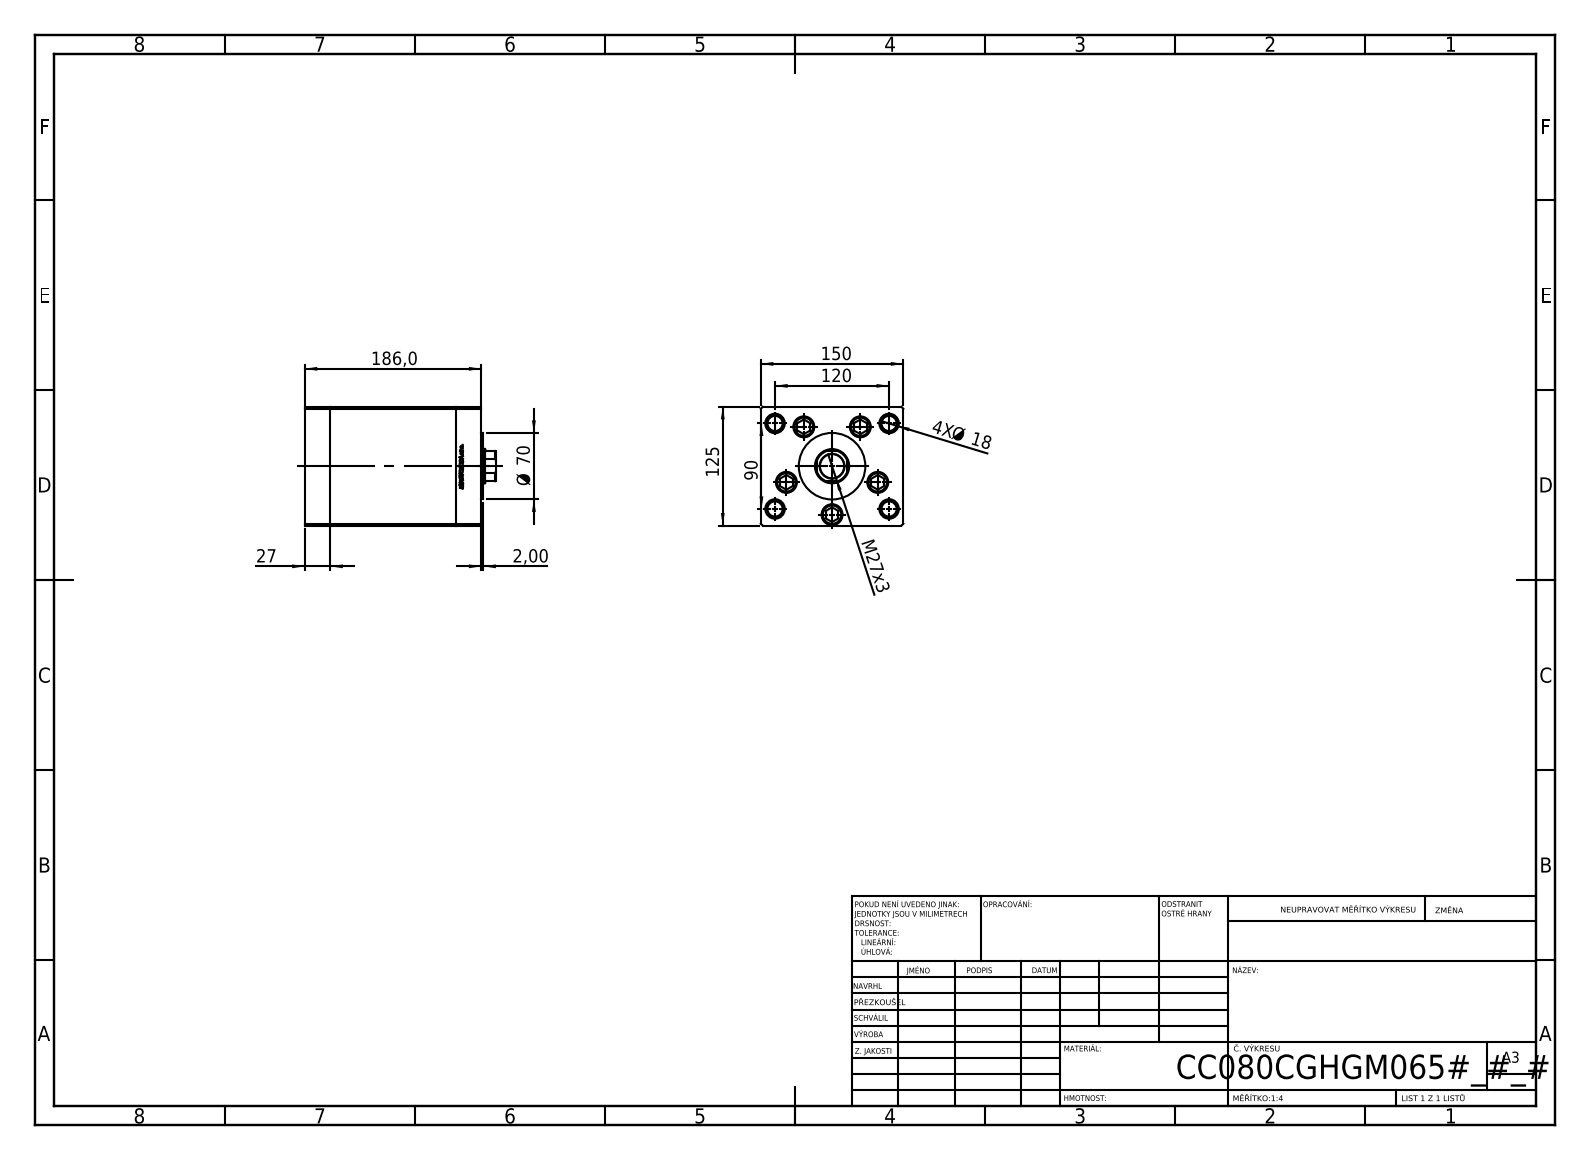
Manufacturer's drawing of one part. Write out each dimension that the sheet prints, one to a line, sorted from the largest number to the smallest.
186,0
150
125
120
90
Ø 70
27
M27x3
4X Ø 18
2,00
